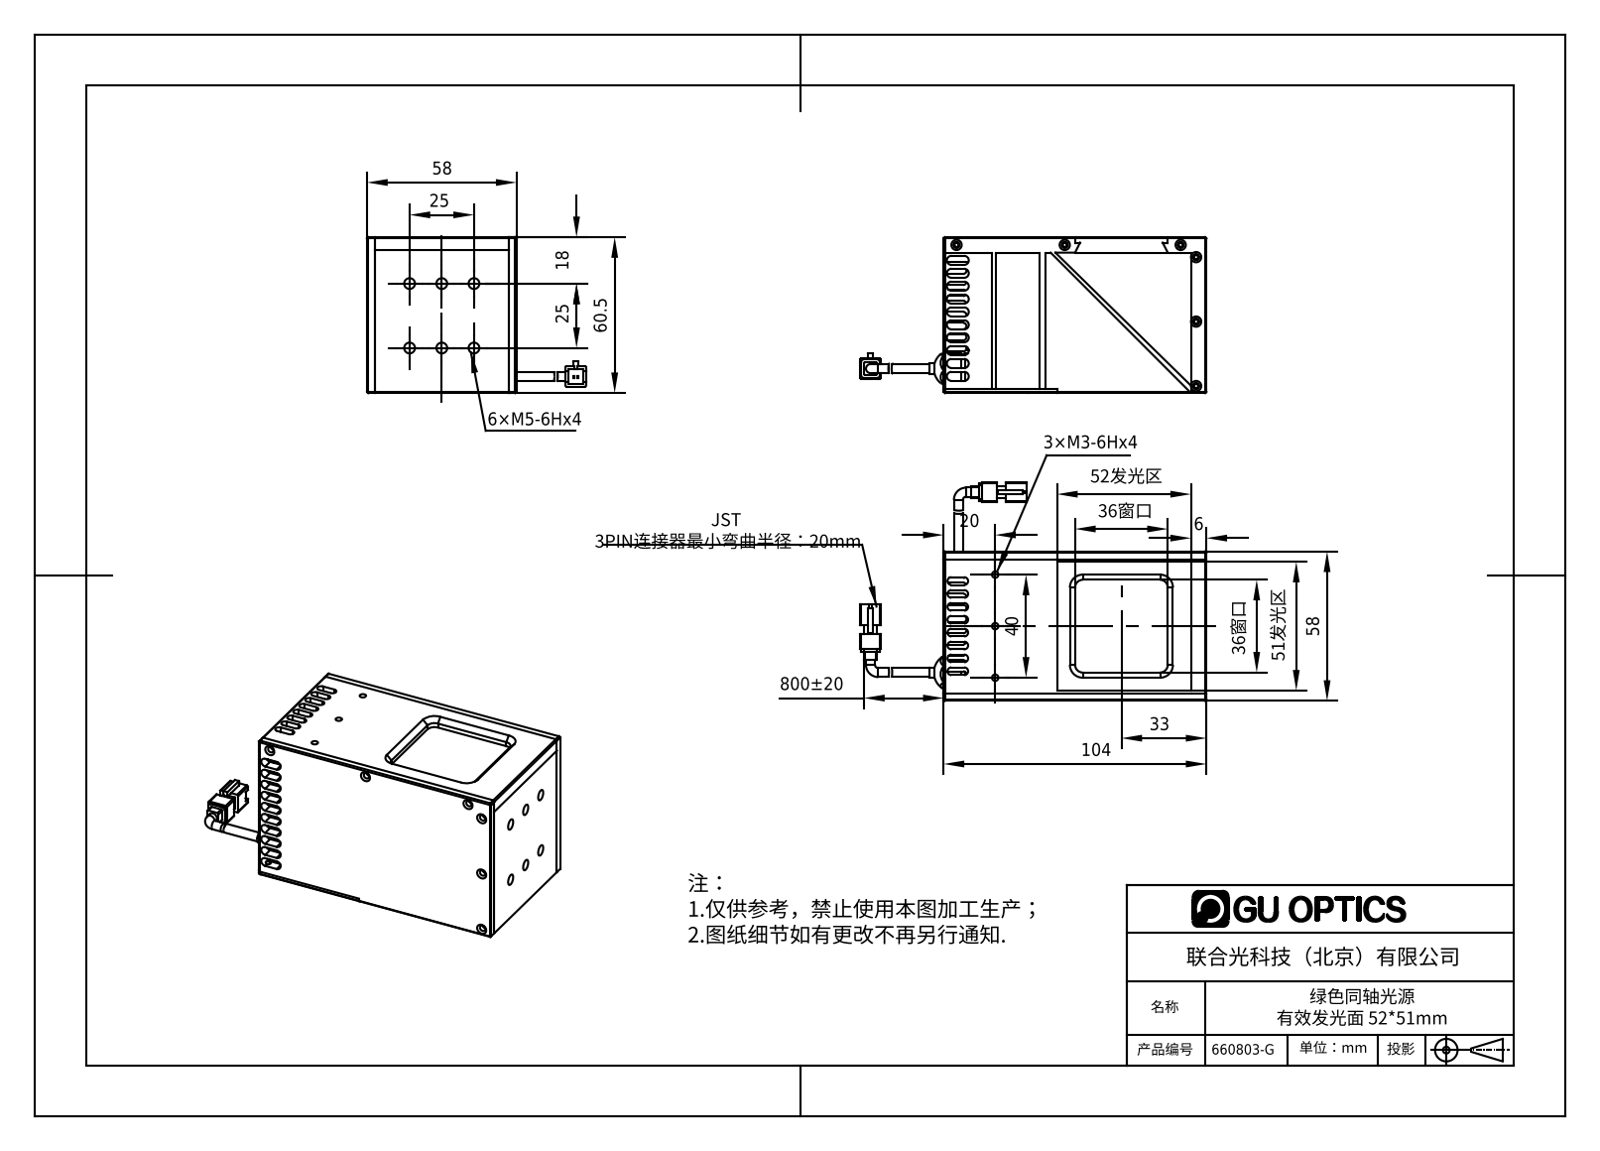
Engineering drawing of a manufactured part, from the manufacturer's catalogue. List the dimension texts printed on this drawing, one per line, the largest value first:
800±20
104
60.5
58
58
52发光区
51发光区
40
36窗口
36窗口
33
25
25
20
18
6
